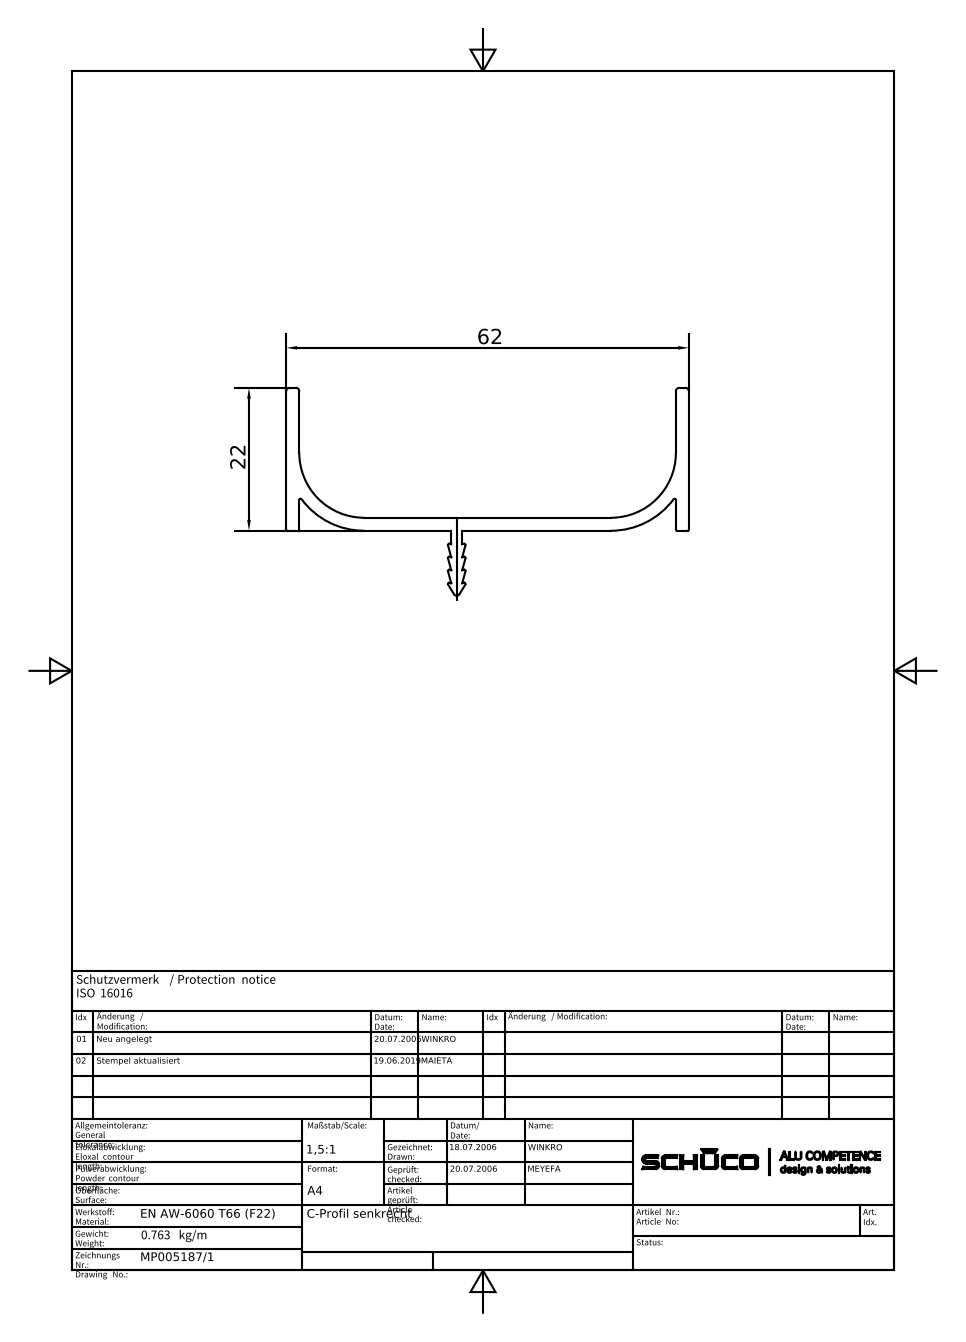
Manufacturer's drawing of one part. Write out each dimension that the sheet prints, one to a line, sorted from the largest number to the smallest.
62
22
